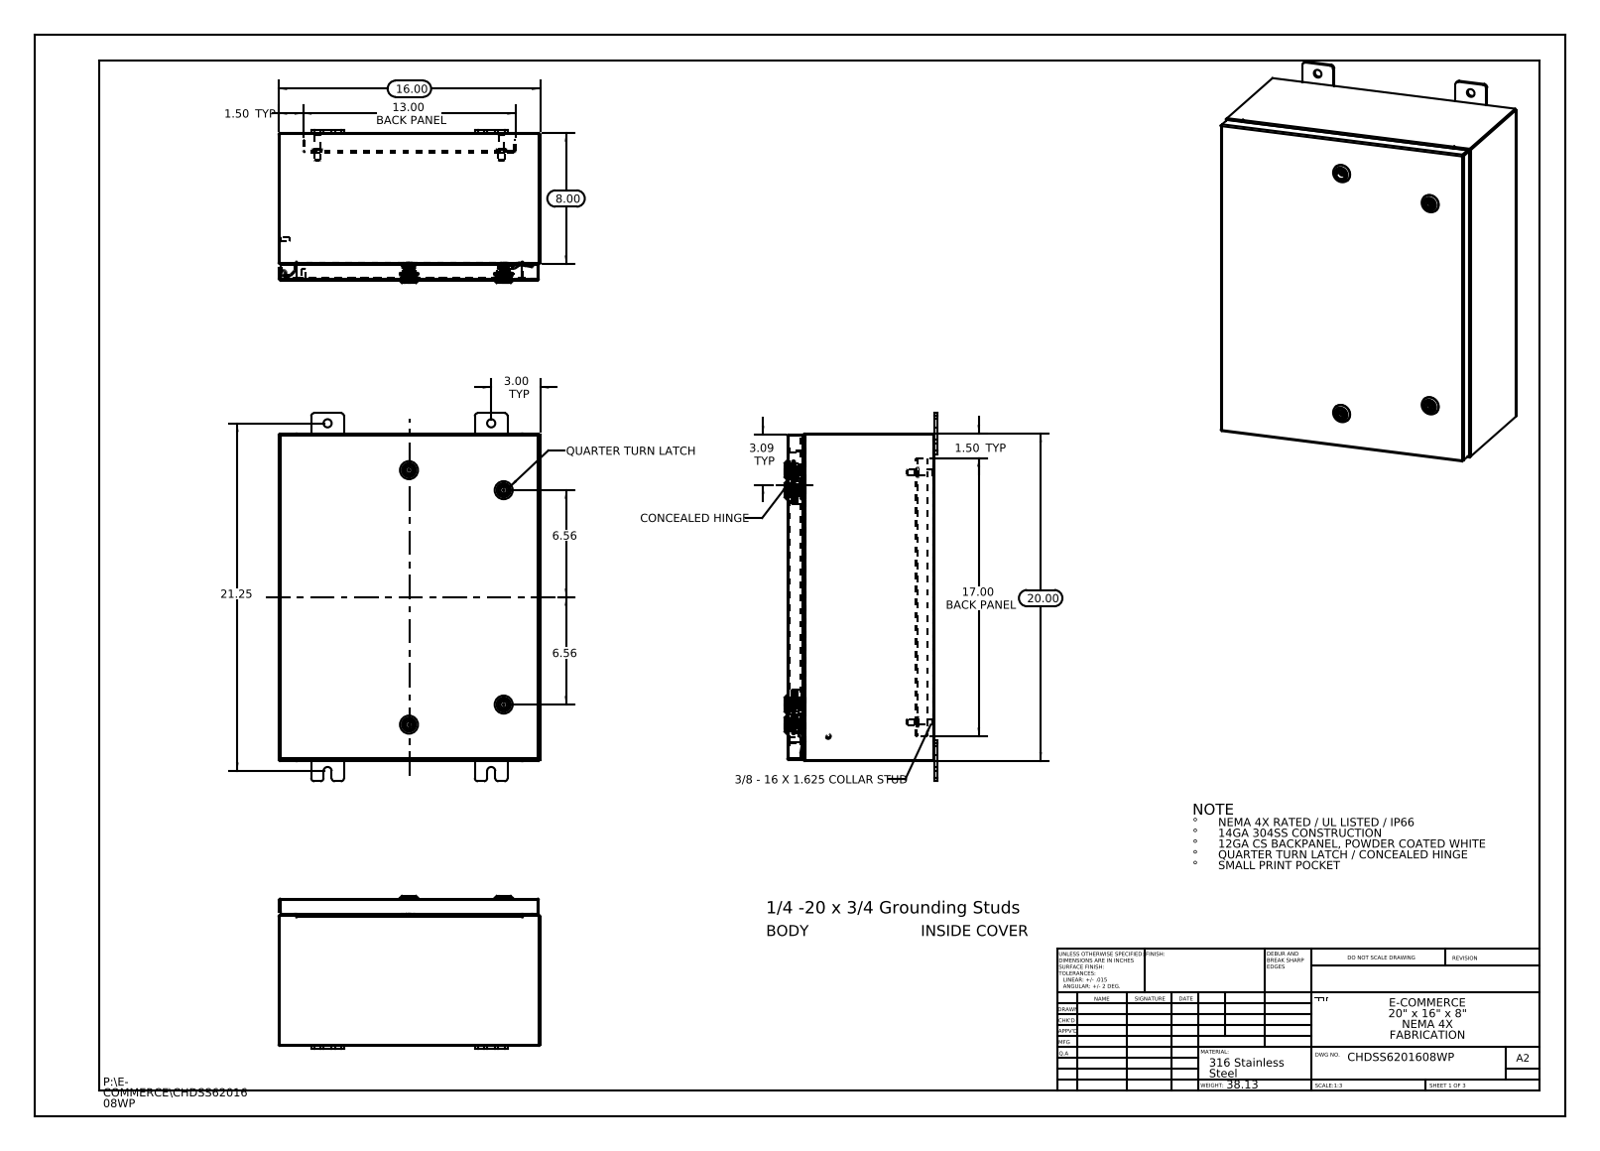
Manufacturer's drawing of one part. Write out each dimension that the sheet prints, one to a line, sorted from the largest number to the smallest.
21.25
20.00
17.00 BACK PANEL
16.00
13.00 BACK PANEL
8.00
6.56
6.56
3.09 TYP
3.00 TYP
1.50 TYP
1.50 TYP
